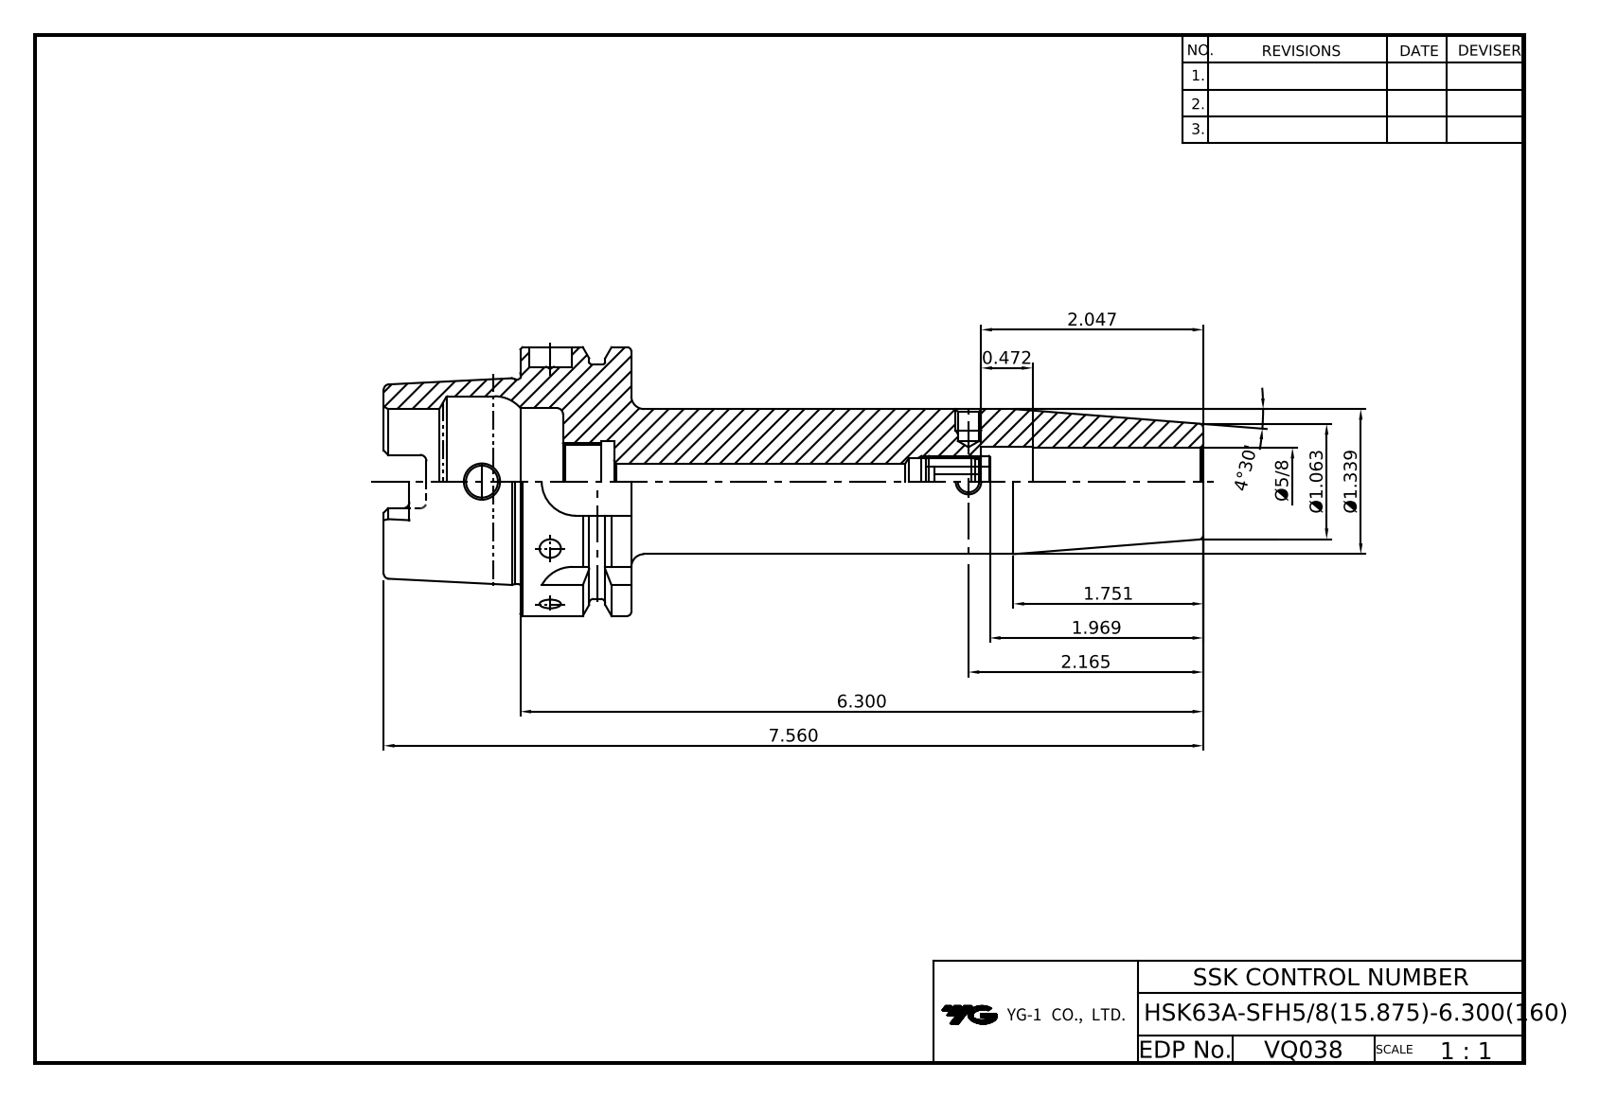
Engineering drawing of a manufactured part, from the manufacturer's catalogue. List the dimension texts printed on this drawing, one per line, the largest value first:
7.560
6.300
4°30'
2.165
2.047
1.969
1.751
Ø1.339
Ø1.063
0.472
